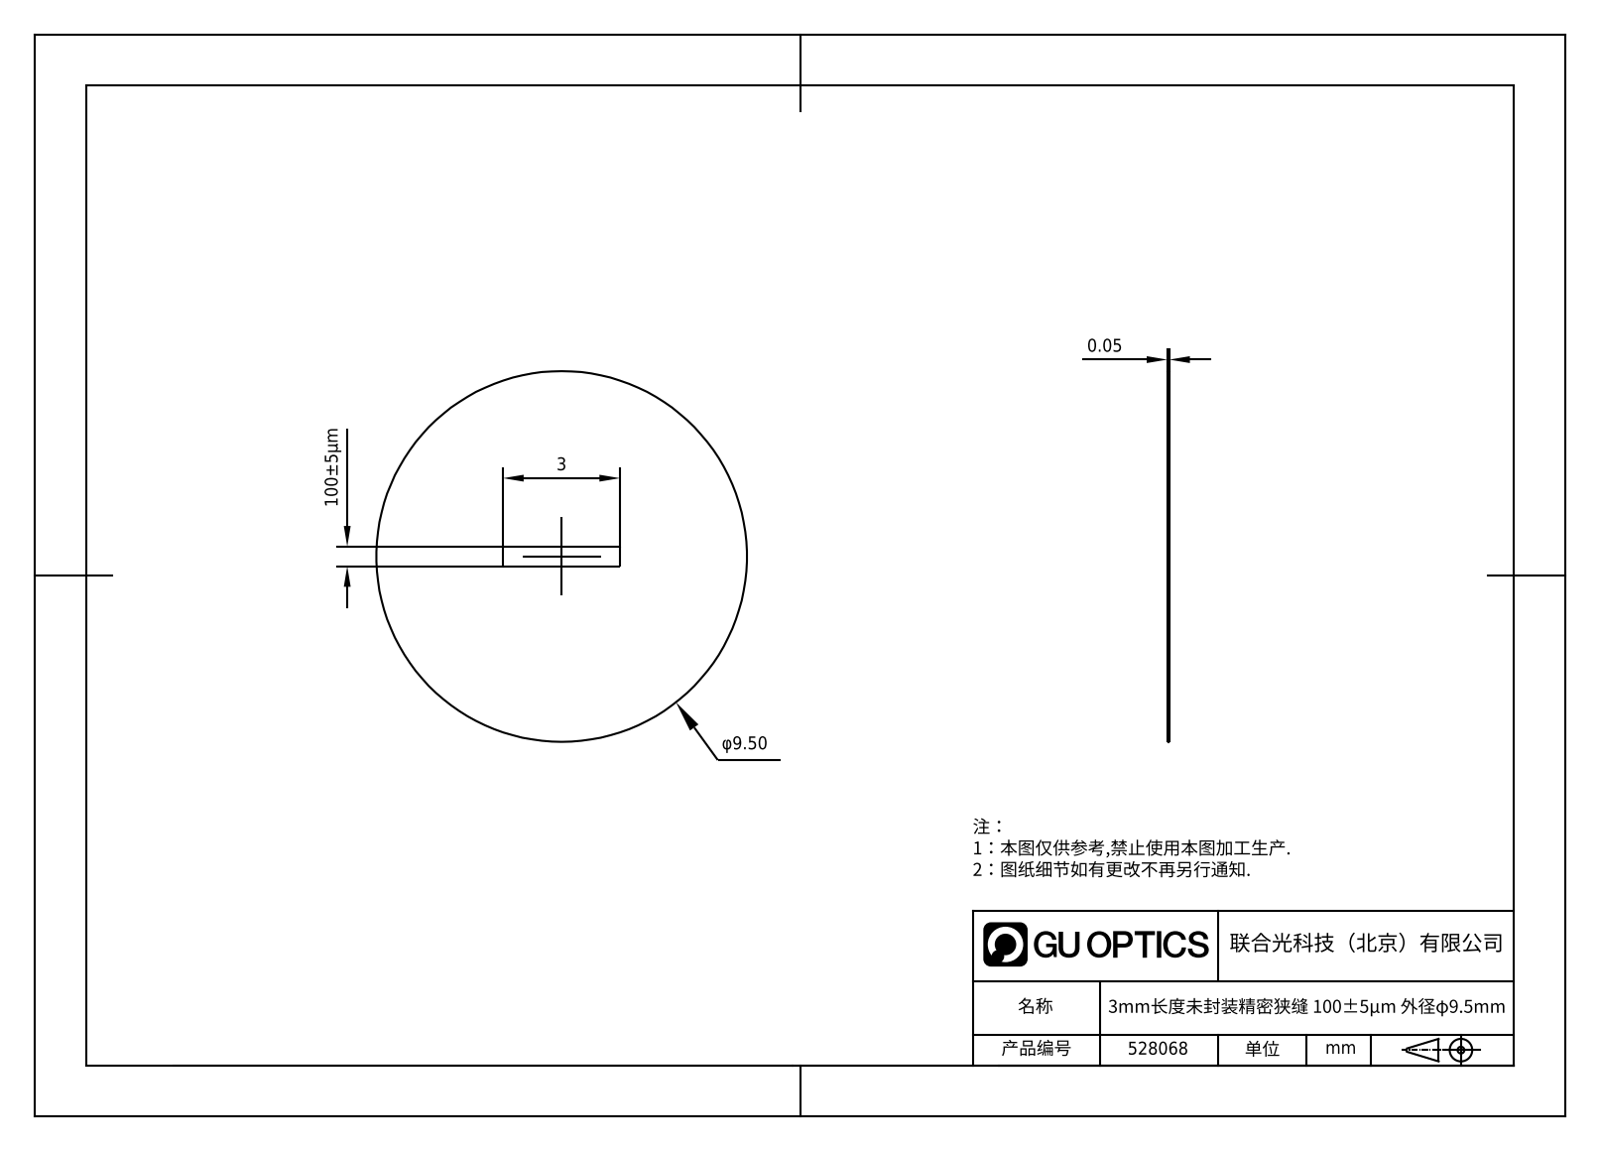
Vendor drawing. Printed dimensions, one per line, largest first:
100±5μm
3
0.05
